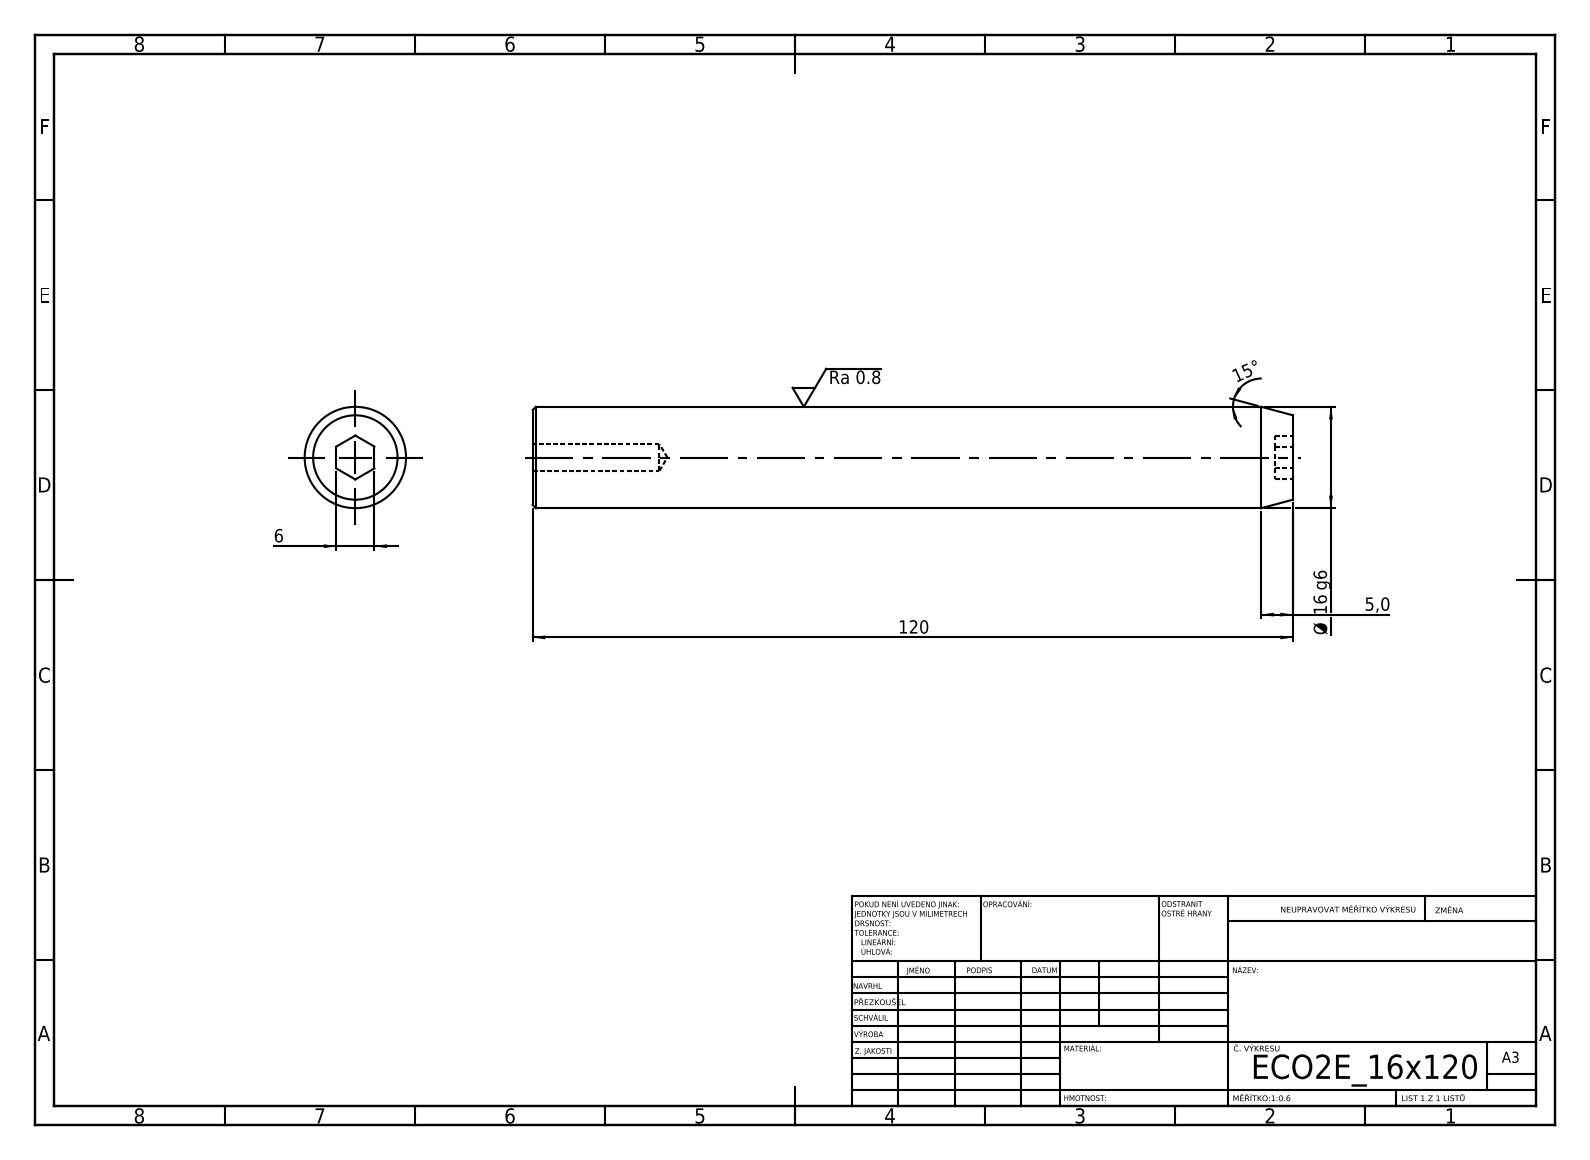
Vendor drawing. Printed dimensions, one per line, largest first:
120
Ø 16 g6
15°
6
5,0
